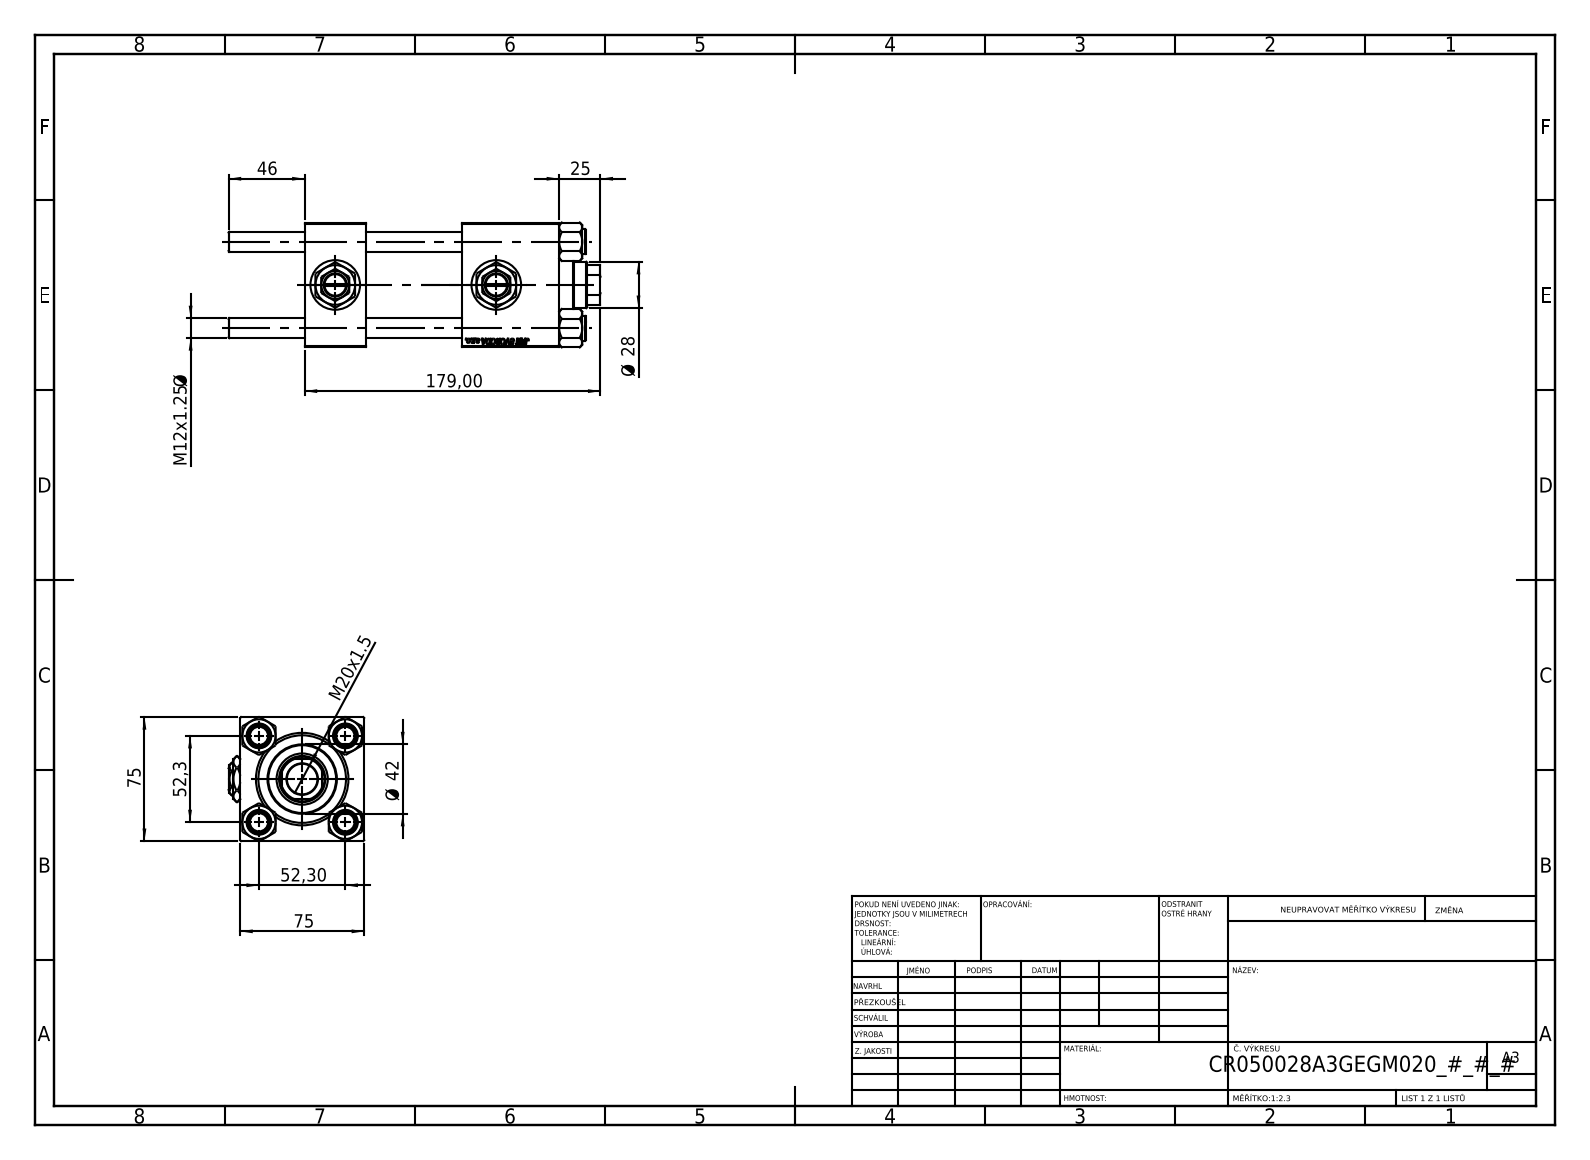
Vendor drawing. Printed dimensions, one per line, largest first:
179,00
75
75
52,3
52,30
46
Ø 42
Ø 28
25
M20x1.5
M12x1.25 Ø
